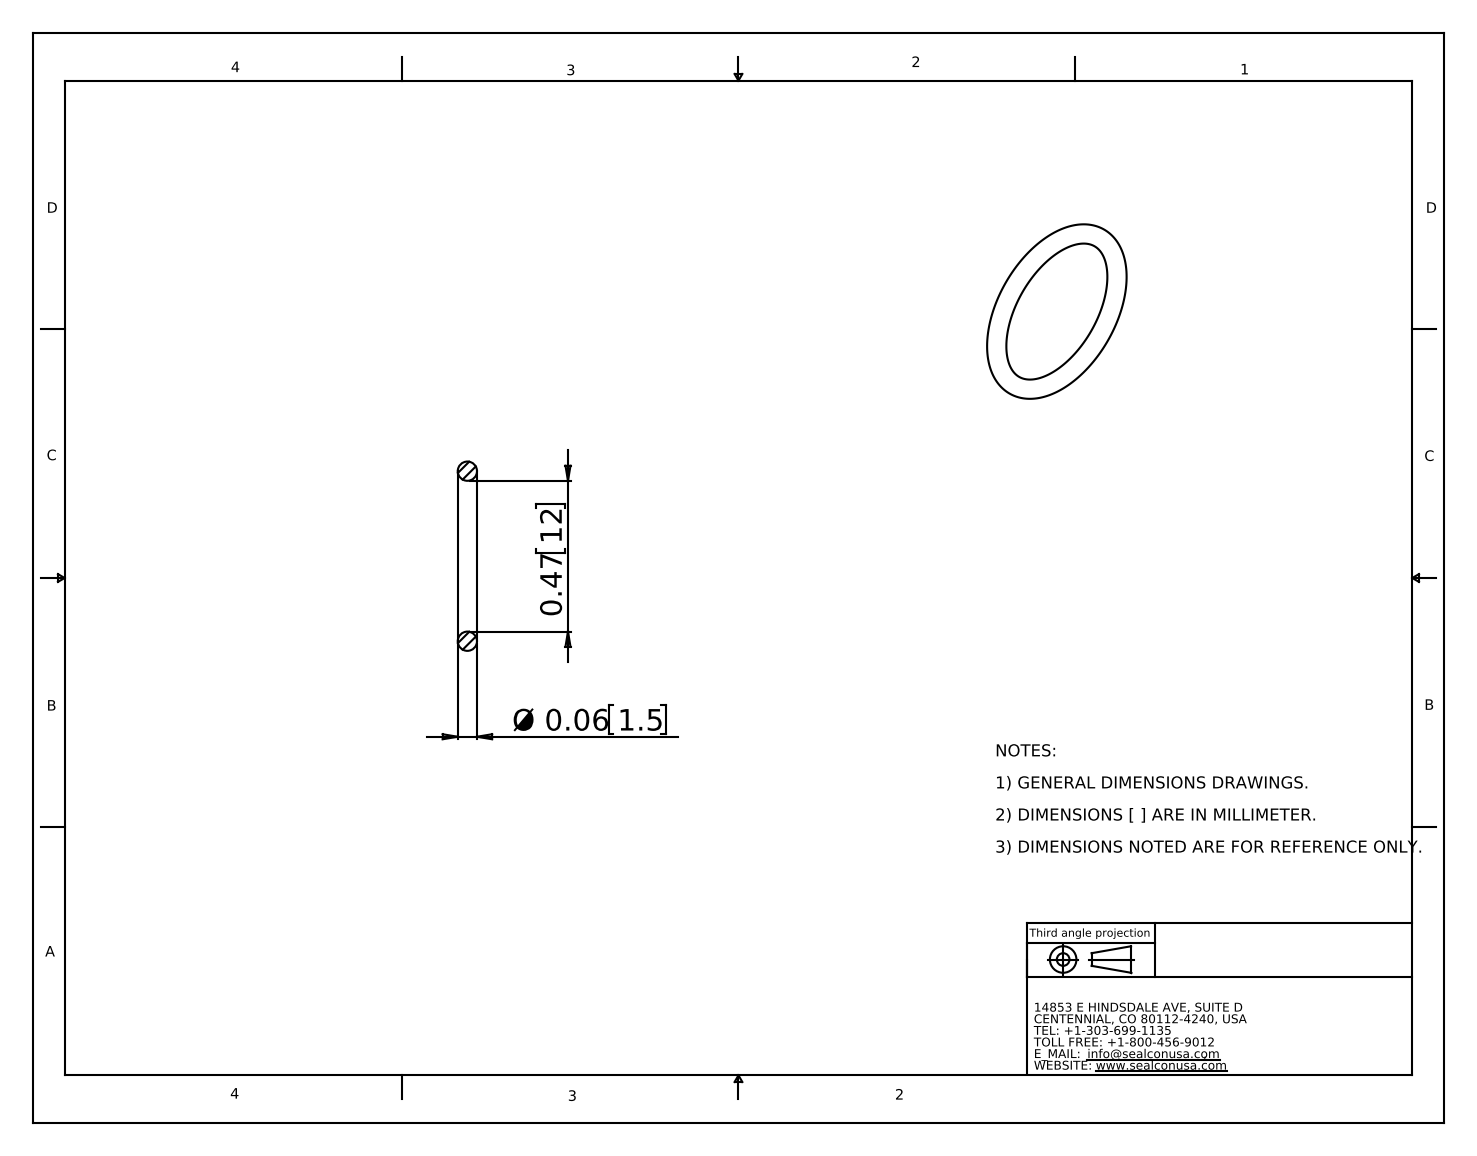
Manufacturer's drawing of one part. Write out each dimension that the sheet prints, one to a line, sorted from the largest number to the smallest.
0.47 12
Ø 0.06 1.5
